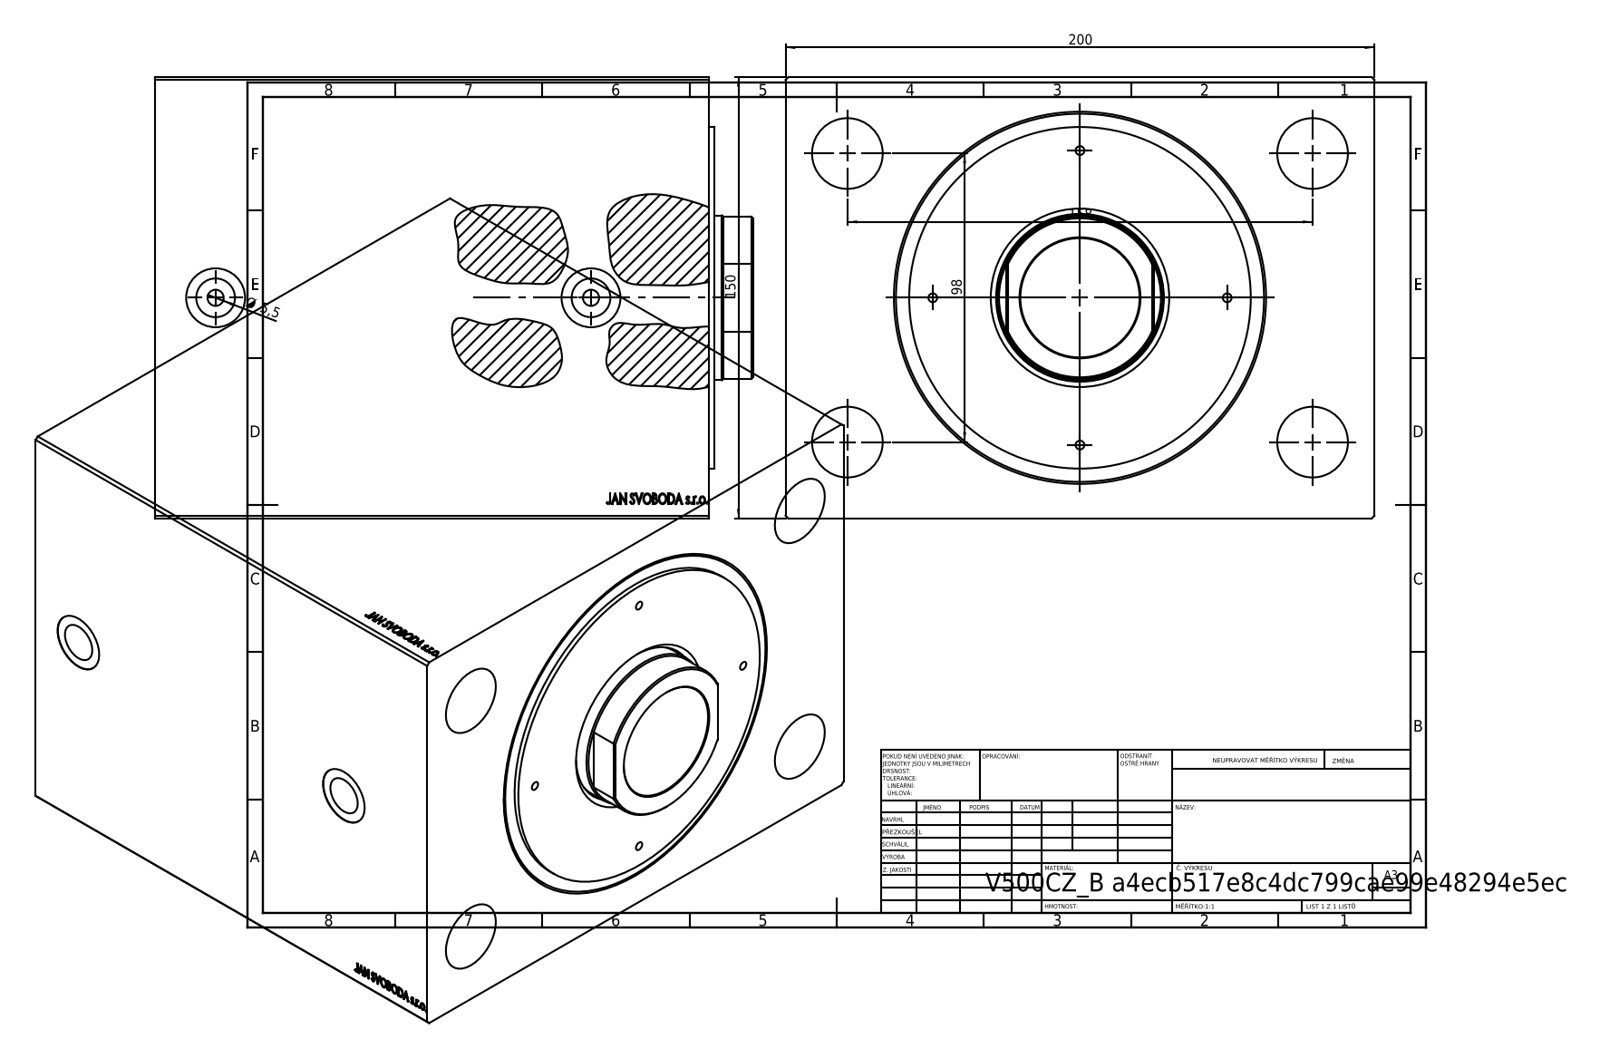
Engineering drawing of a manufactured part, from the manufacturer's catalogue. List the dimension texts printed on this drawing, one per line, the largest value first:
200
158
150
98
Ø 5,5
